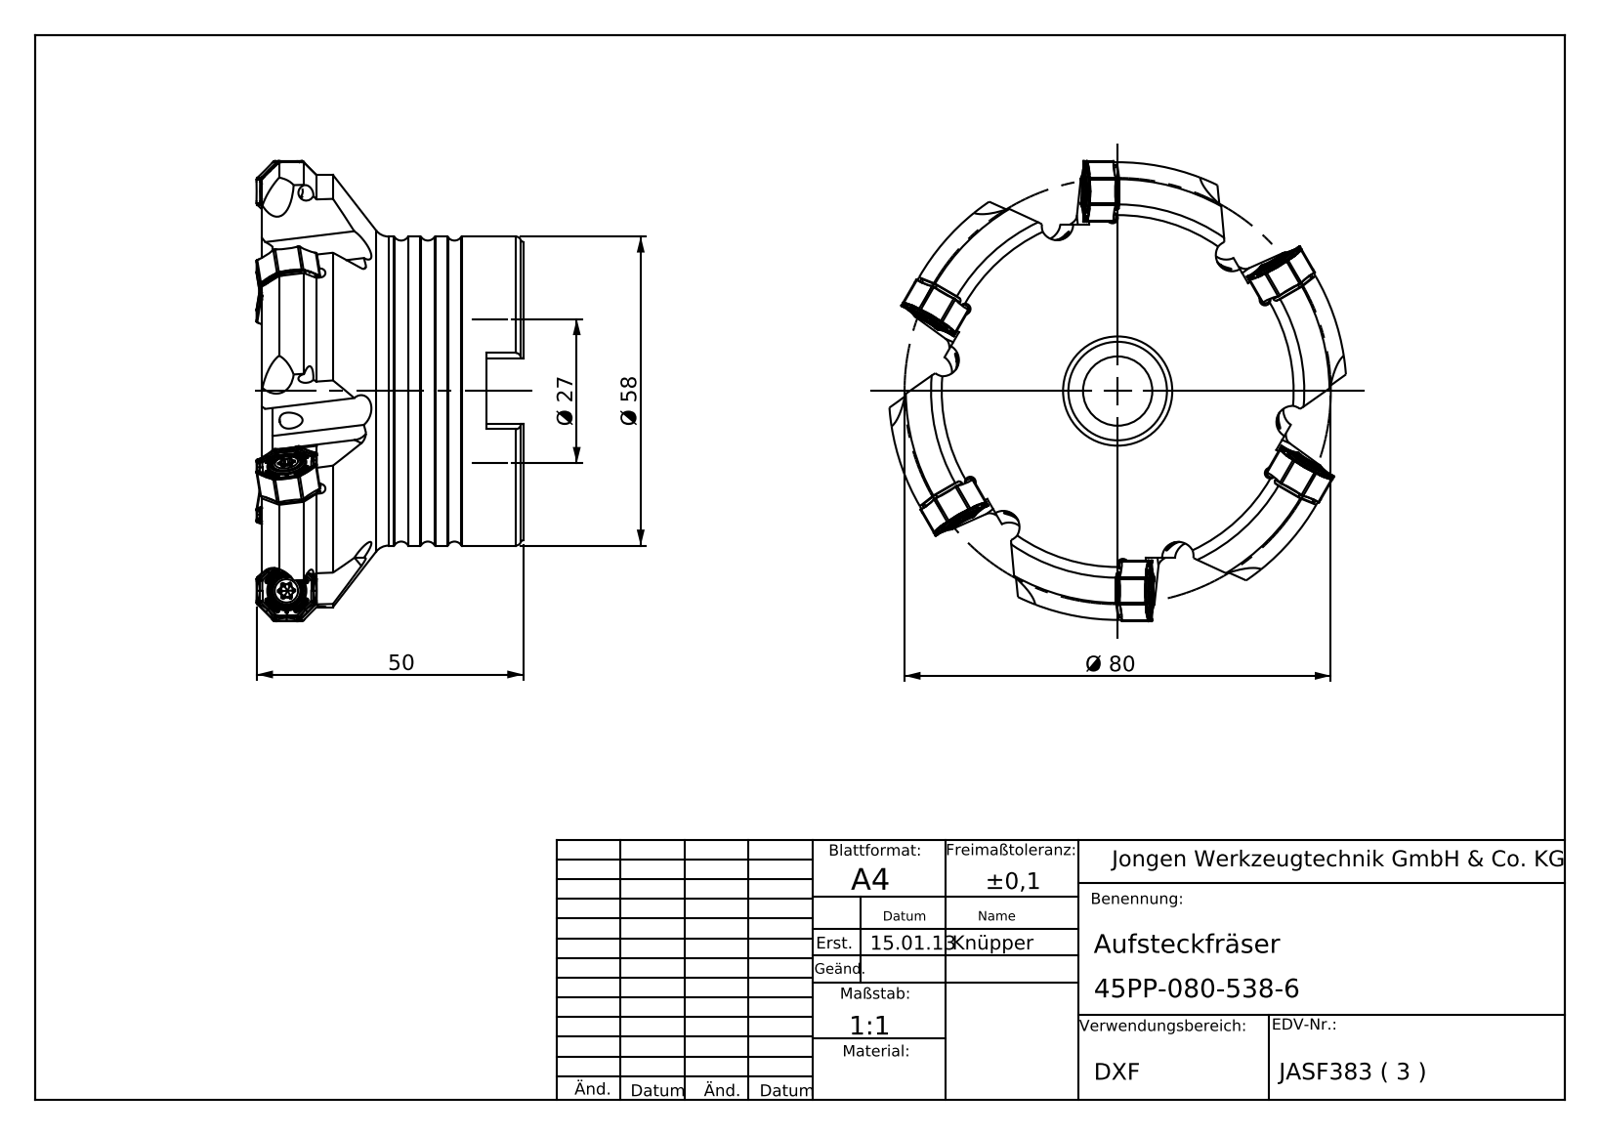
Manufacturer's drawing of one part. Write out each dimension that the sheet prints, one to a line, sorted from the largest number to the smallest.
Ø 80
Ø 58
50
Ø 27
